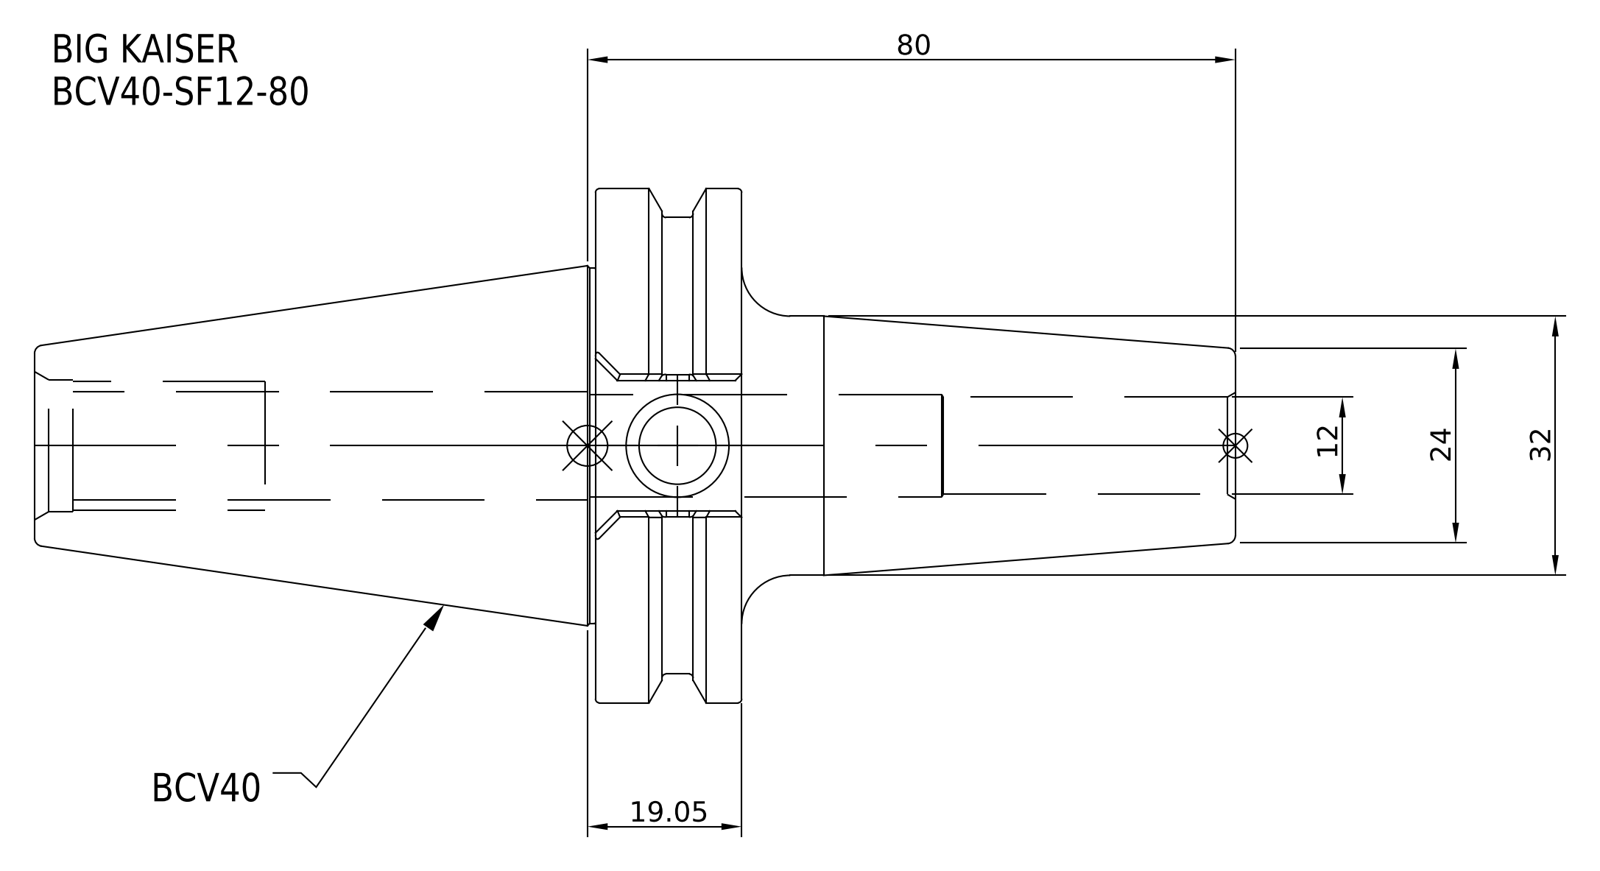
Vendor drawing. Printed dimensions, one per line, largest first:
80
32
24
19.05
12
